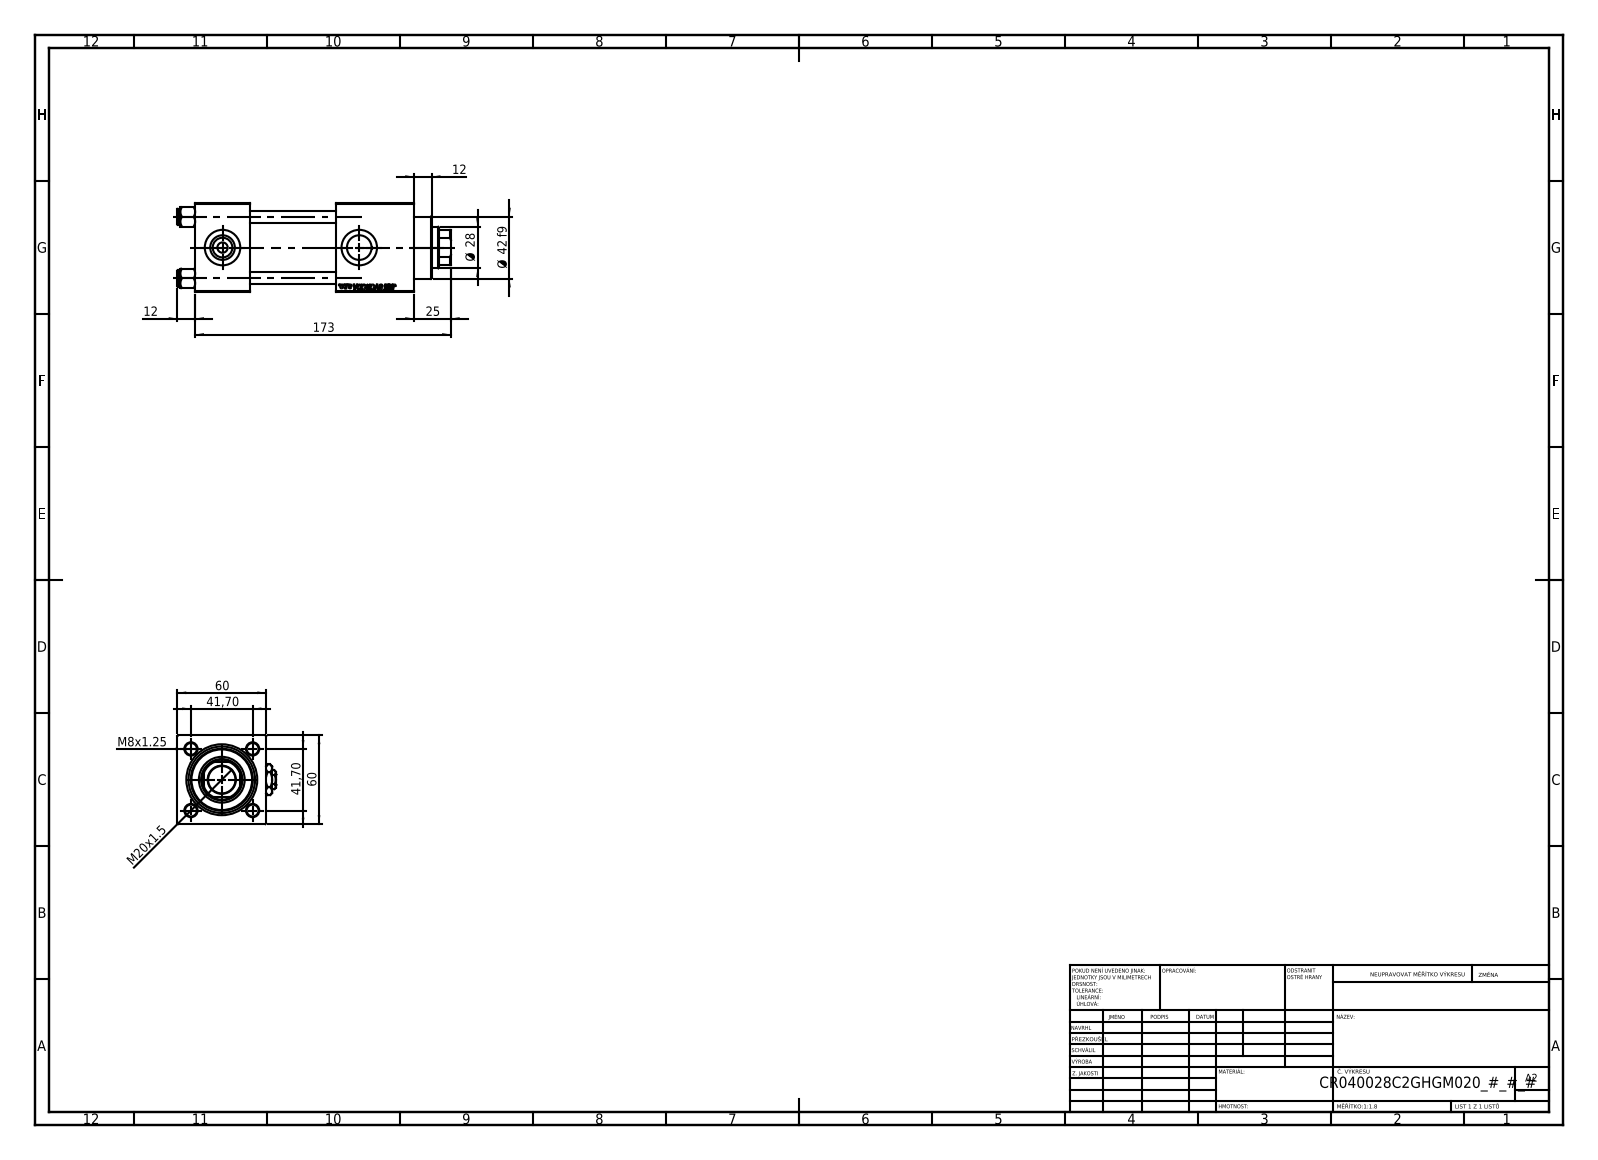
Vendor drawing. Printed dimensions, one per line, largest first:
173
60
60
Ø 42 f9
41,70
41,70
Ø 28
25
M20x1.5
12
12
M8x1.25
